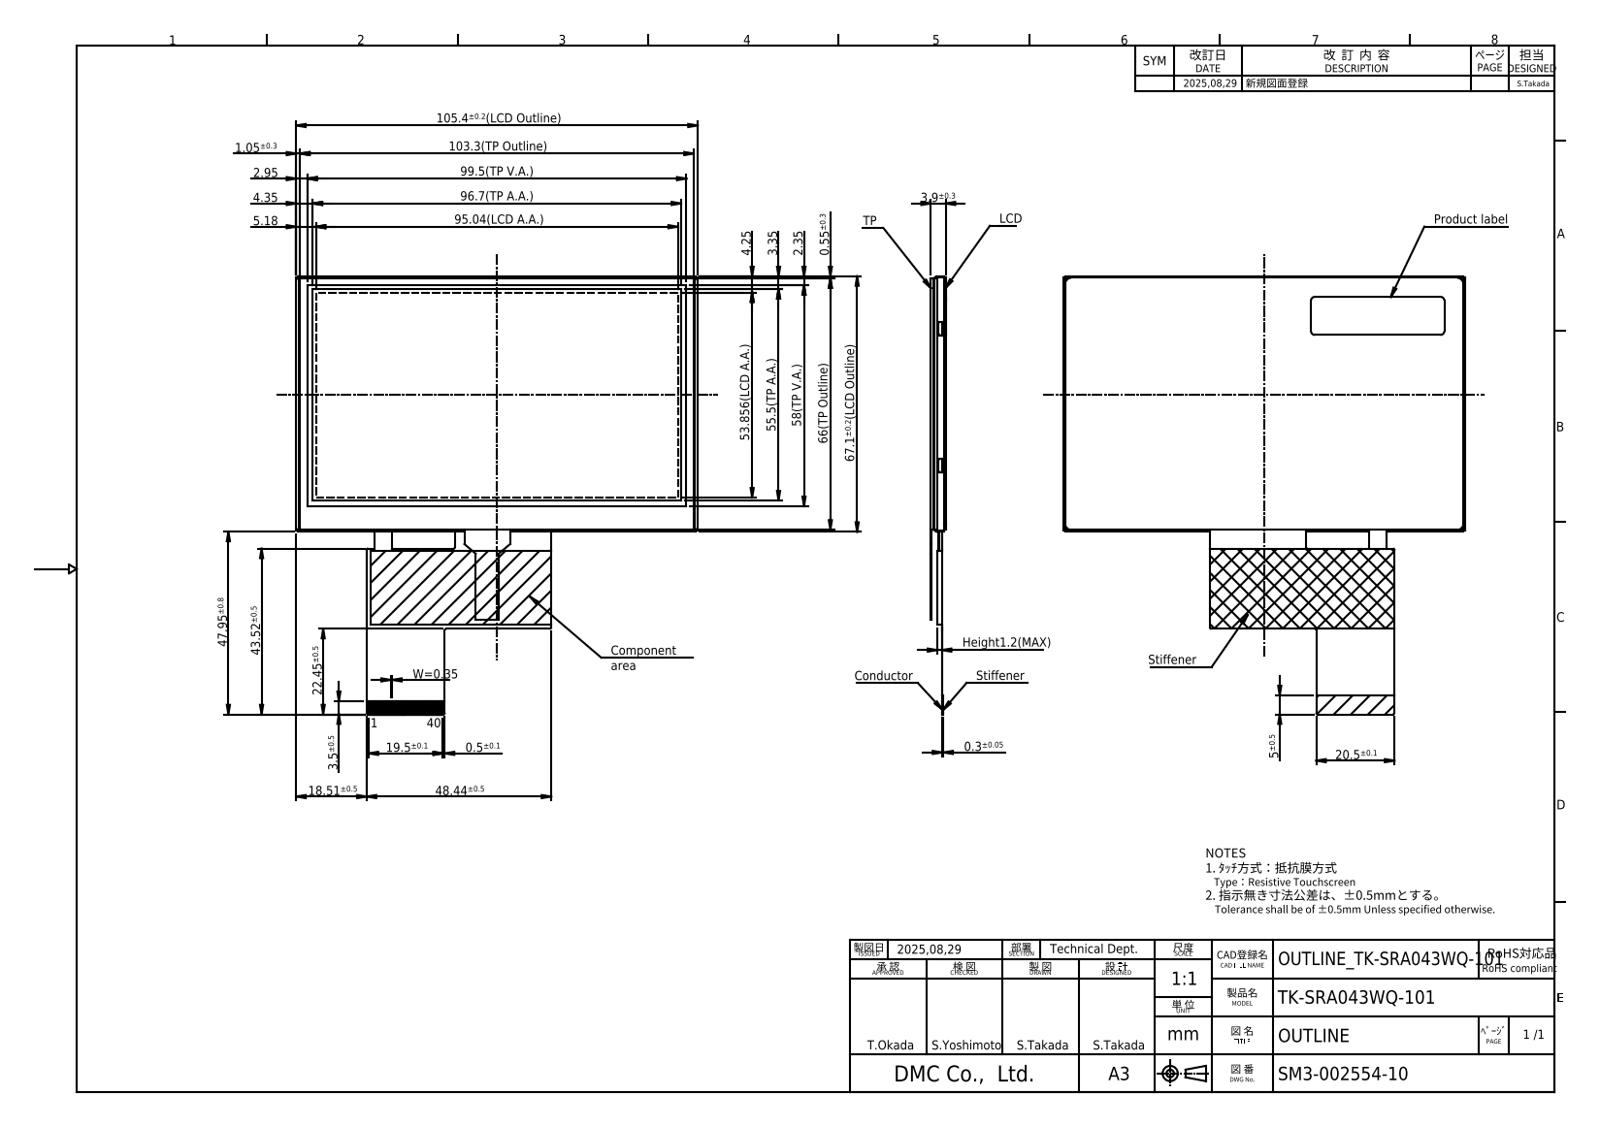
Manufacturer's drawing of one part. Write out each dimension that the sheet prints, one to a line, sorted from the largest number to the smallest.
105.4±0.2(LCD Outline)
103.3(TP Outline)
99.5(TP V.A.)
96.7(TP A.A.)
95.04(LCD A.A.)
67.1±0.2(LCD Outline)
66(TP Outline)
58(TP V.A.)
55.5(TP A.A.)
53.856(LCD A.A.)
48.44±0.5
47.95±0.8
43.52±0.5
22.45±0.5
20.5±0.1
19.5±0.1
18.51±0.5
5.18
5±0.5
4.35
4.25
3.9±0.3
3.5±0.5
3.35
2.95
2.35
Height1.2(MAX)
1.05±0.3
0.55±0.3
0.5±0.1
W=0.35
0.3±0.05
